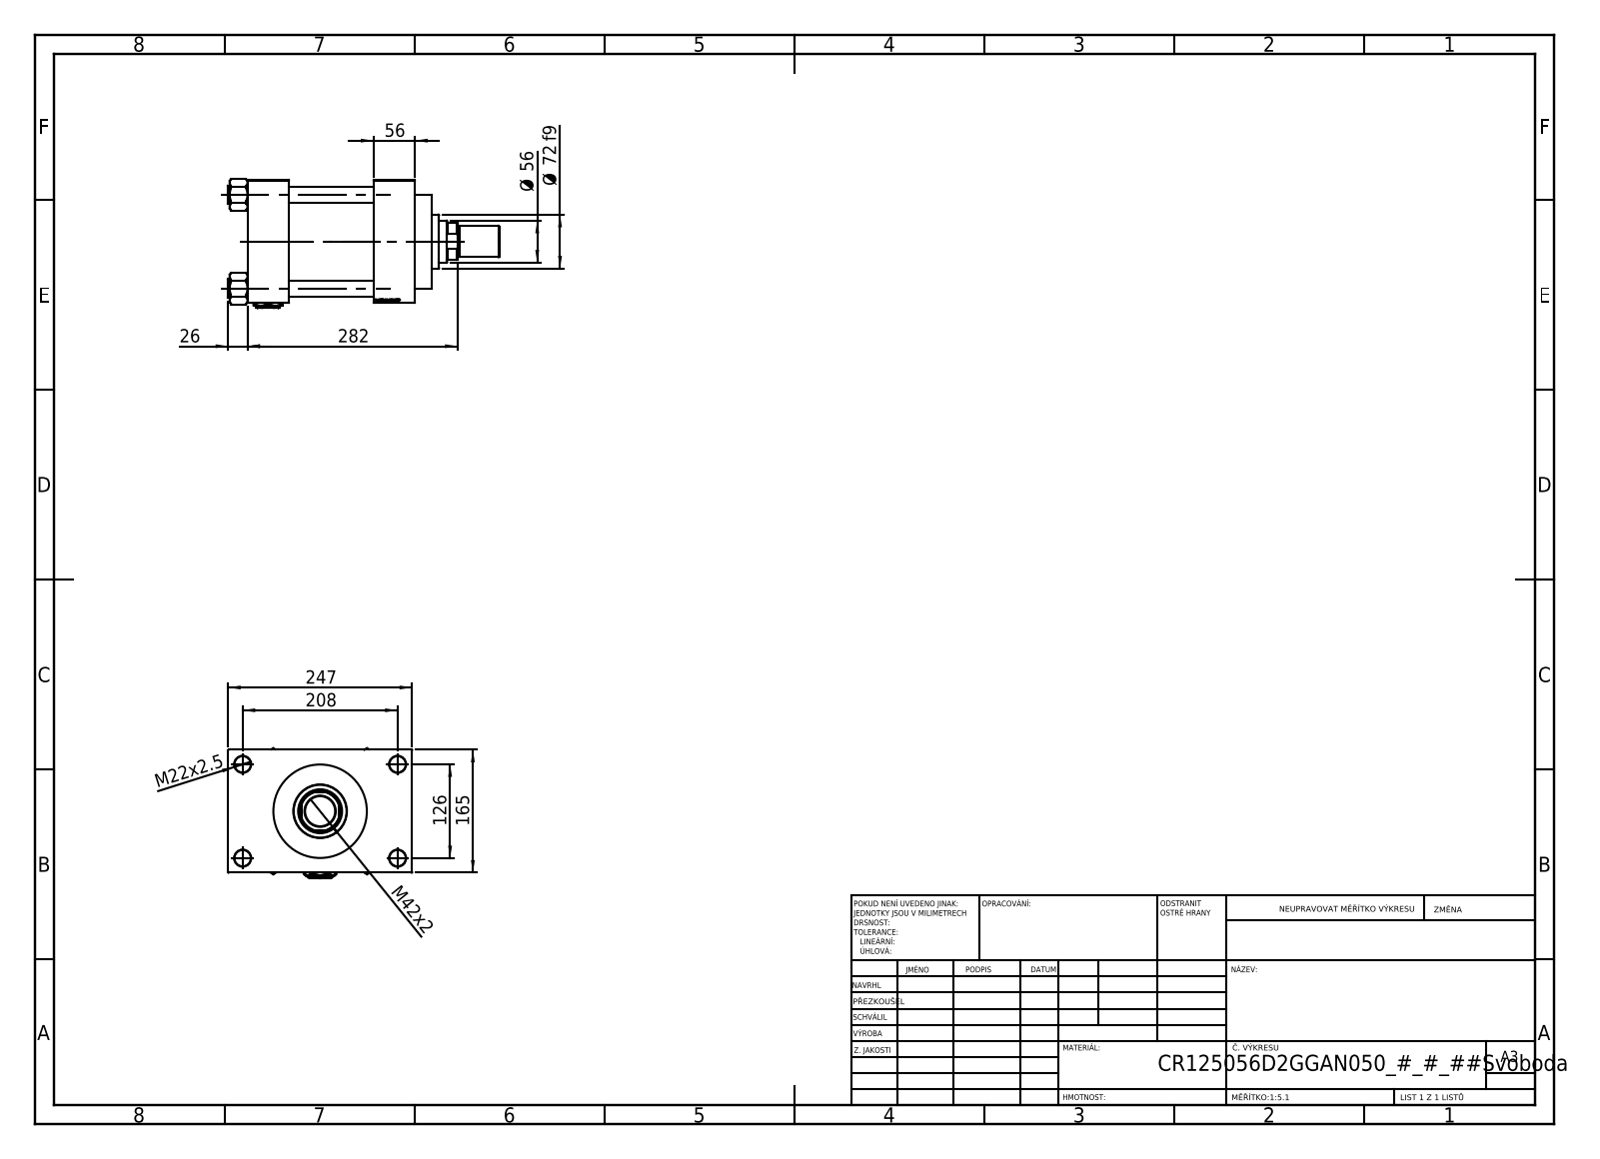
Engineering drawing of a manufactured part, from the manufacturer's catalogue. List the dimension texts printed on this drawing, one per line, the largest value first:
282
247
208
165
126
Ø 72 f9
56
Ø 56
M42x2
26
M22x2.5
